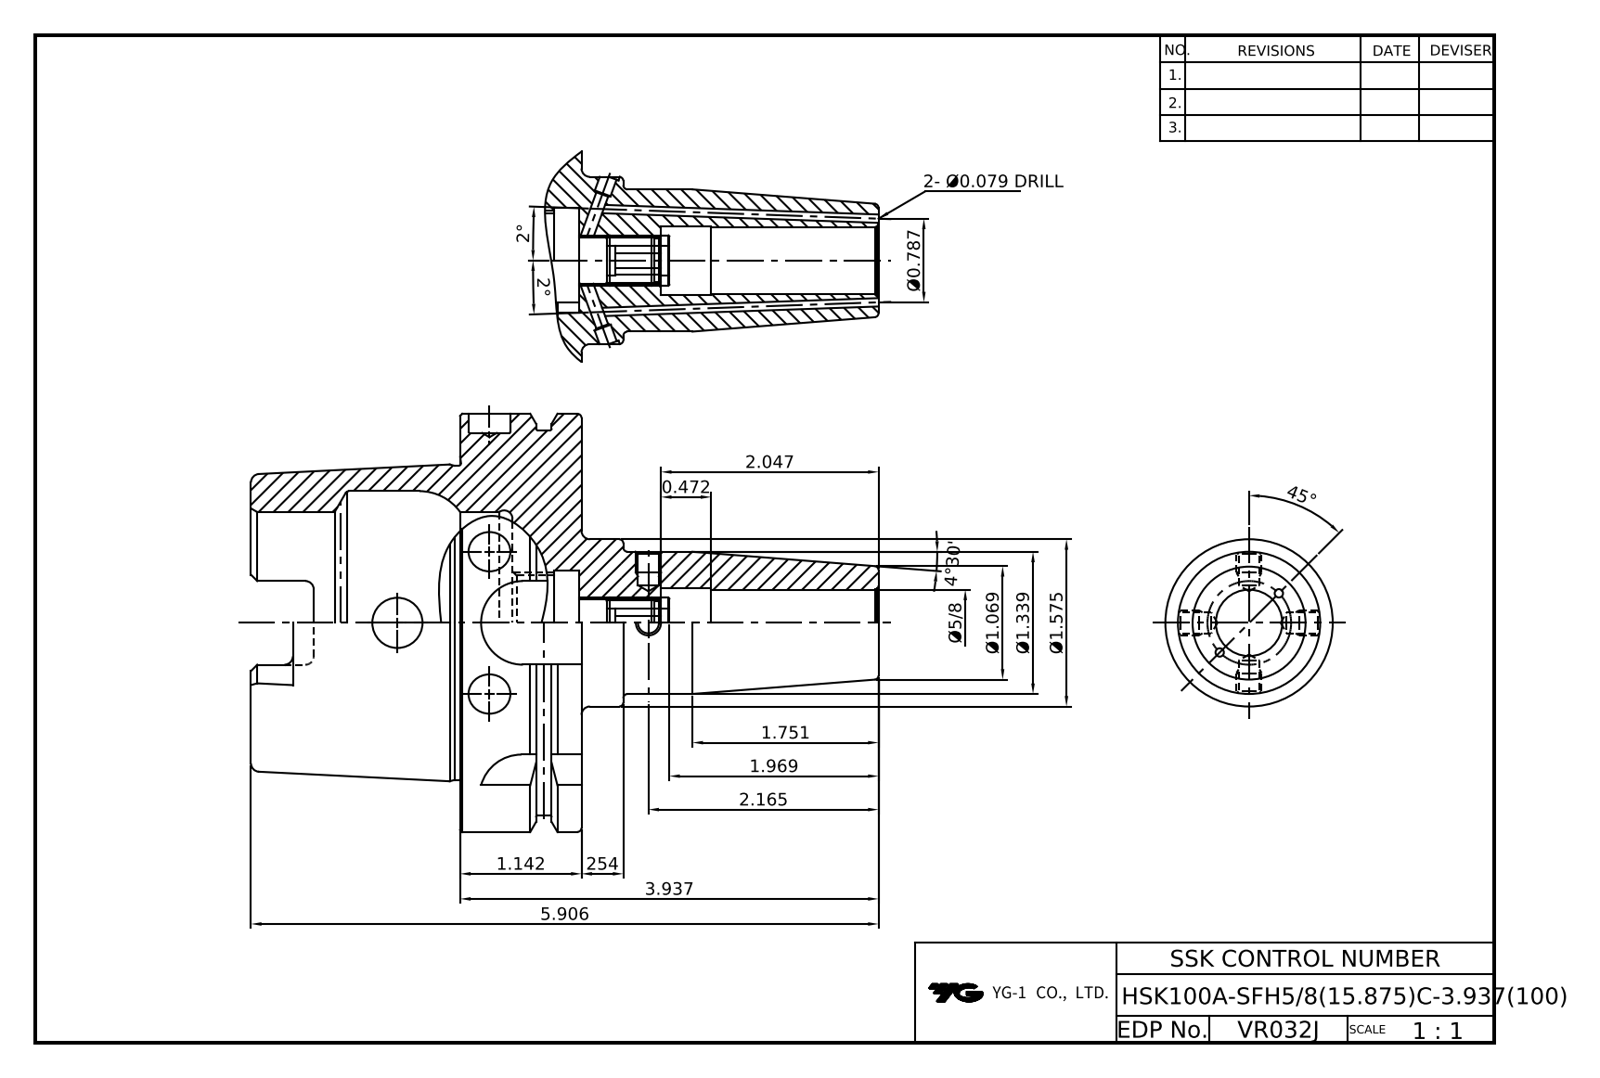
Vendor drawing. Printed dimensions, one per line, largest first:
254
45°
5.906
3.937
2.165
2.047
2°
2°
1.969
1.751
Ø1.575
Ø1.339
1.142
Ø1.069
Ø0.787
0.472
